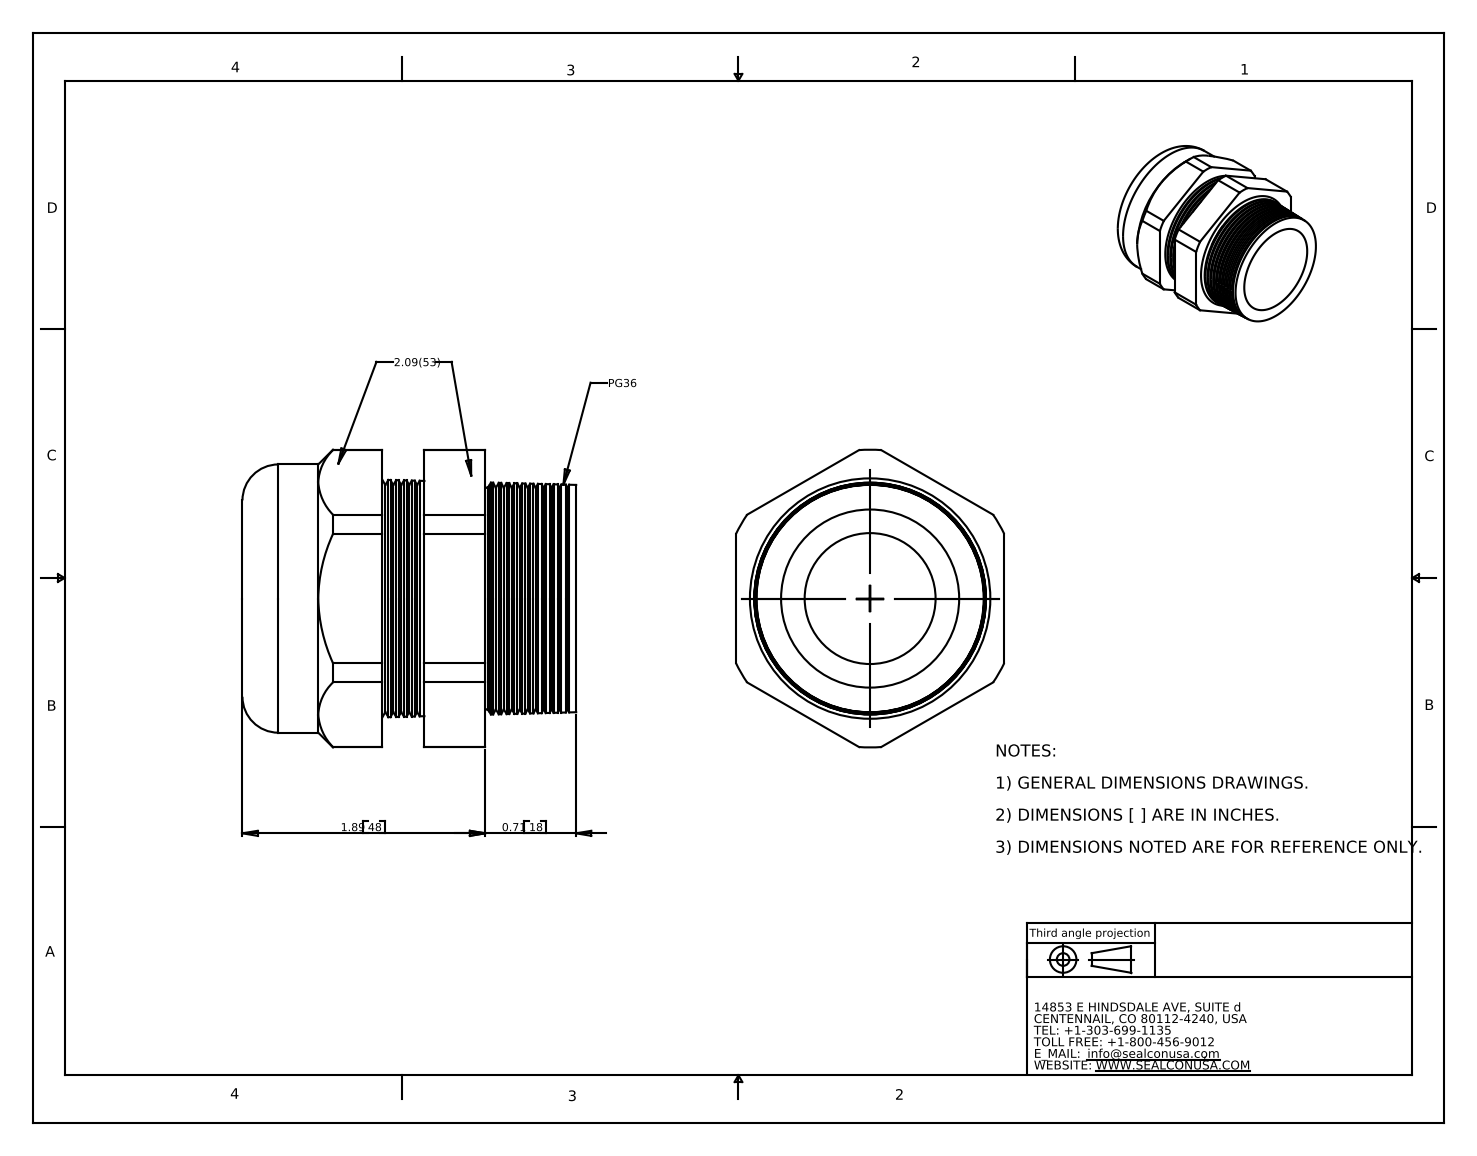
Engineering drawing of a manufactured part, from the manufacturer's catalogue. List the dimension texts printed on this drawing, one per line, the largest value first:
1.89 48
0.71 18
